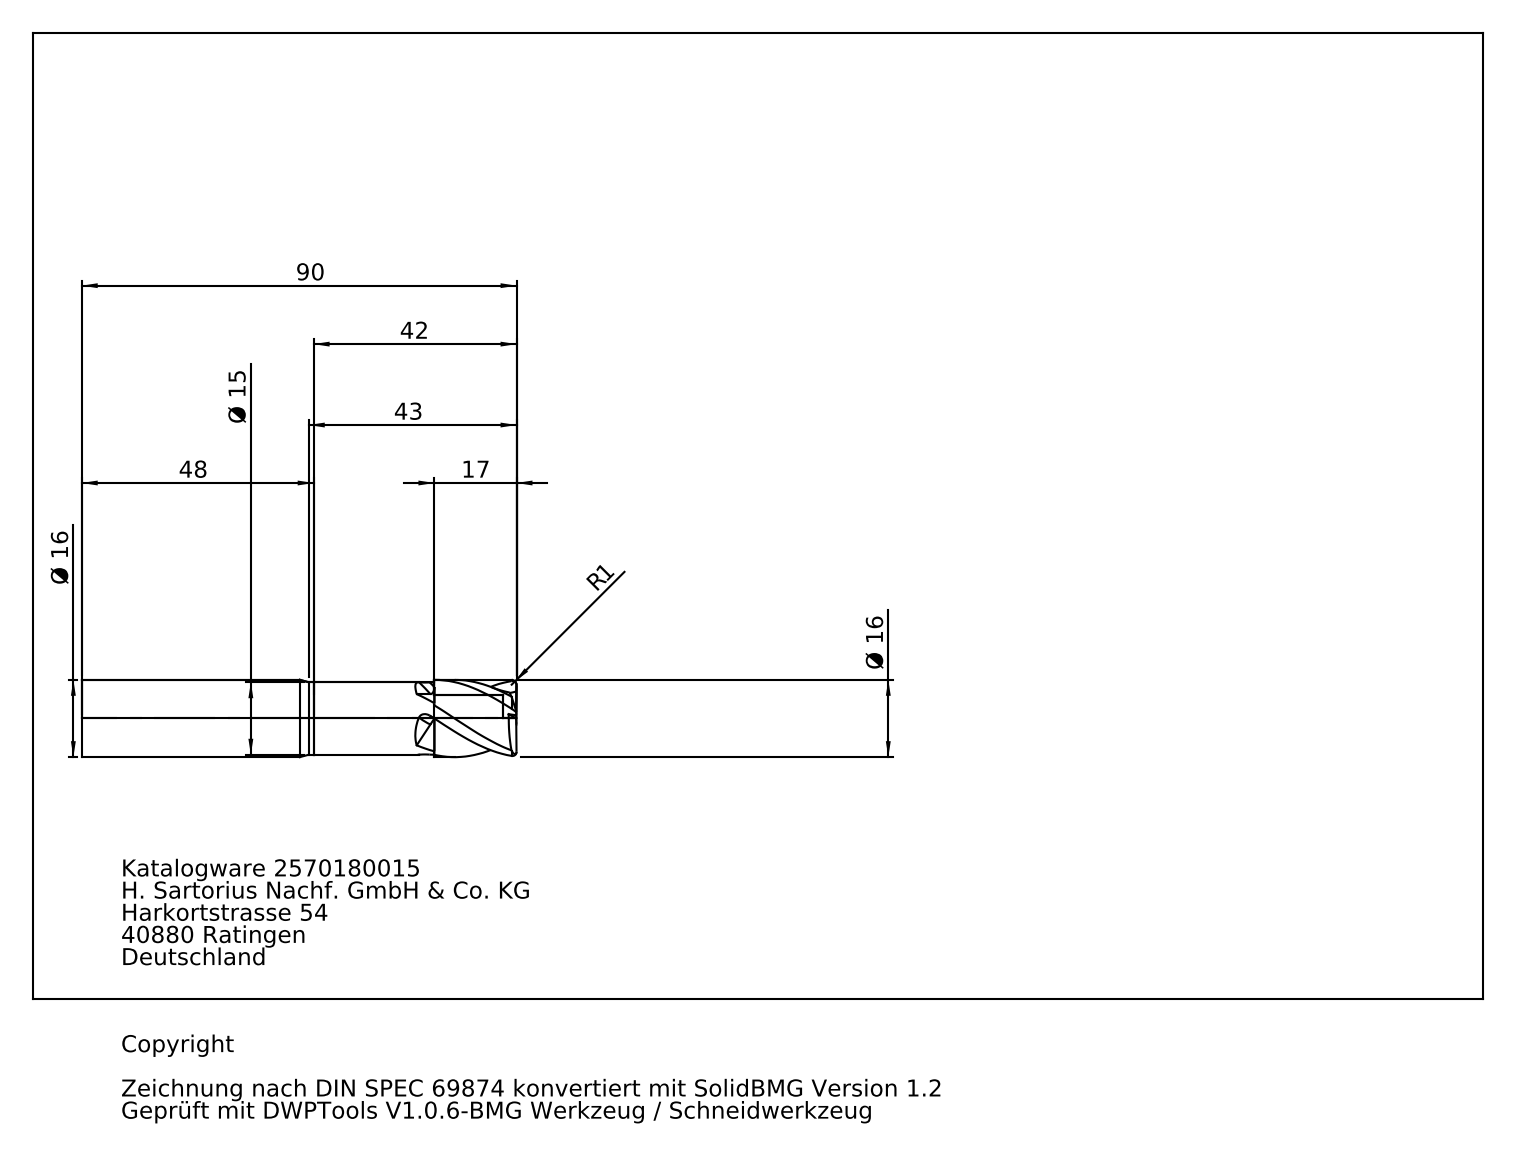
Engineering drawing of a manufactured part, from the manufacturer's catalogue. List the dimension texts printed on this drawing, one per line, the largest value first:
90
48
43
42
17
Ø 16
Ø 16
Ø 15
R 1
